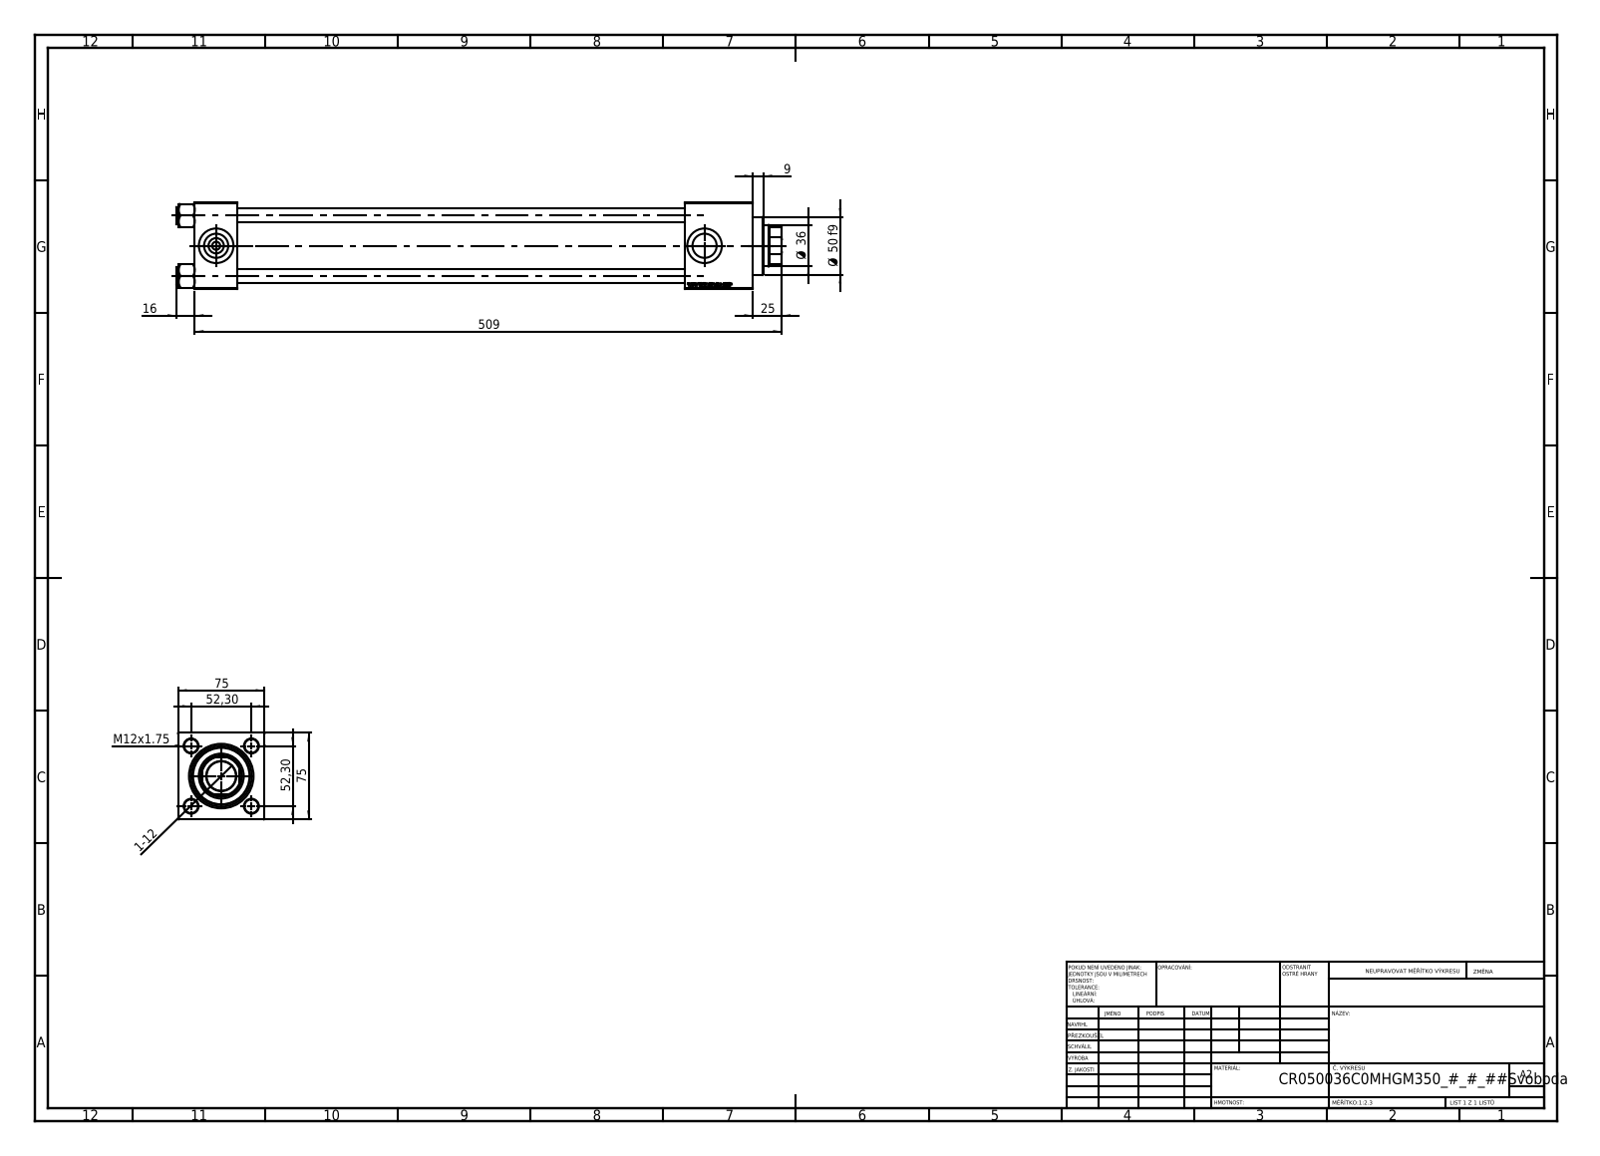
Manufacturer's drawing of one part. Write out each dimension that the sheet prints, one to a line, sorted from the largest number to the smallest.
509
75
75
52,30
52,30
Ø 50 f9
Ø 36
25
16
M12x1.75
9
1-12
